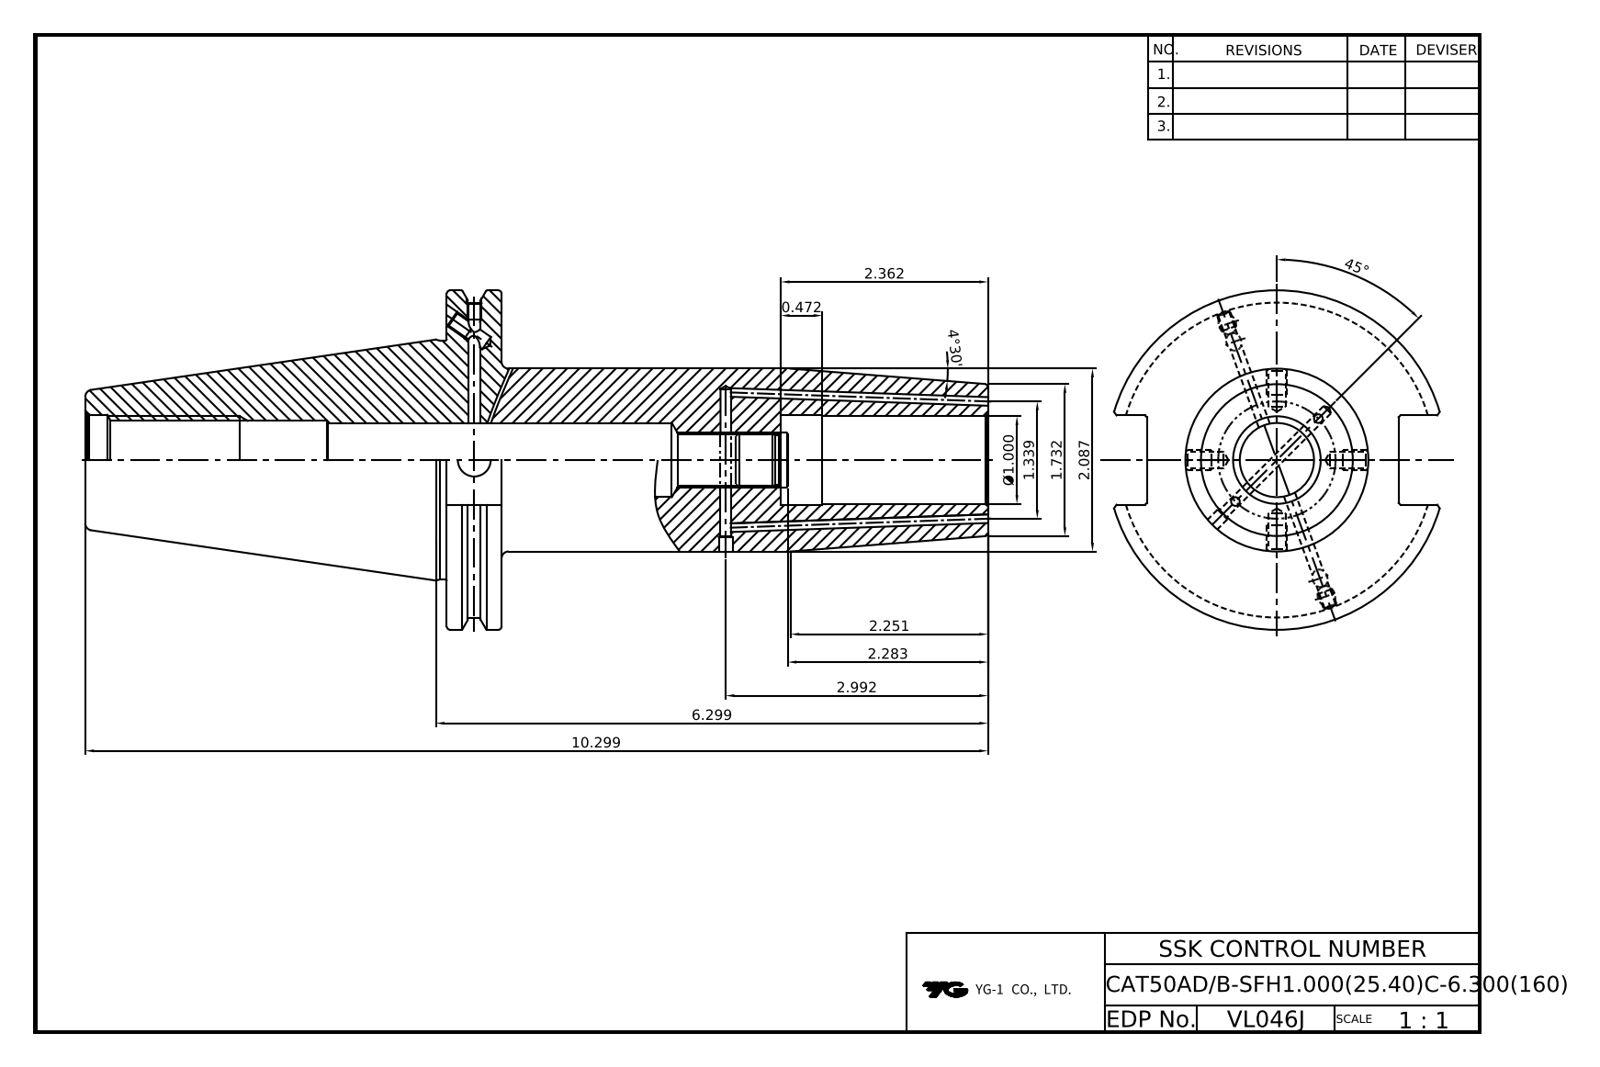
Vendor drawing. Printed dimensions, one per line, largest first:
45°
10.299
6.299
4°30'
2.992
2.362
2.283
2.251
2.087
1.732
1.339
Ø1.000
0.472
